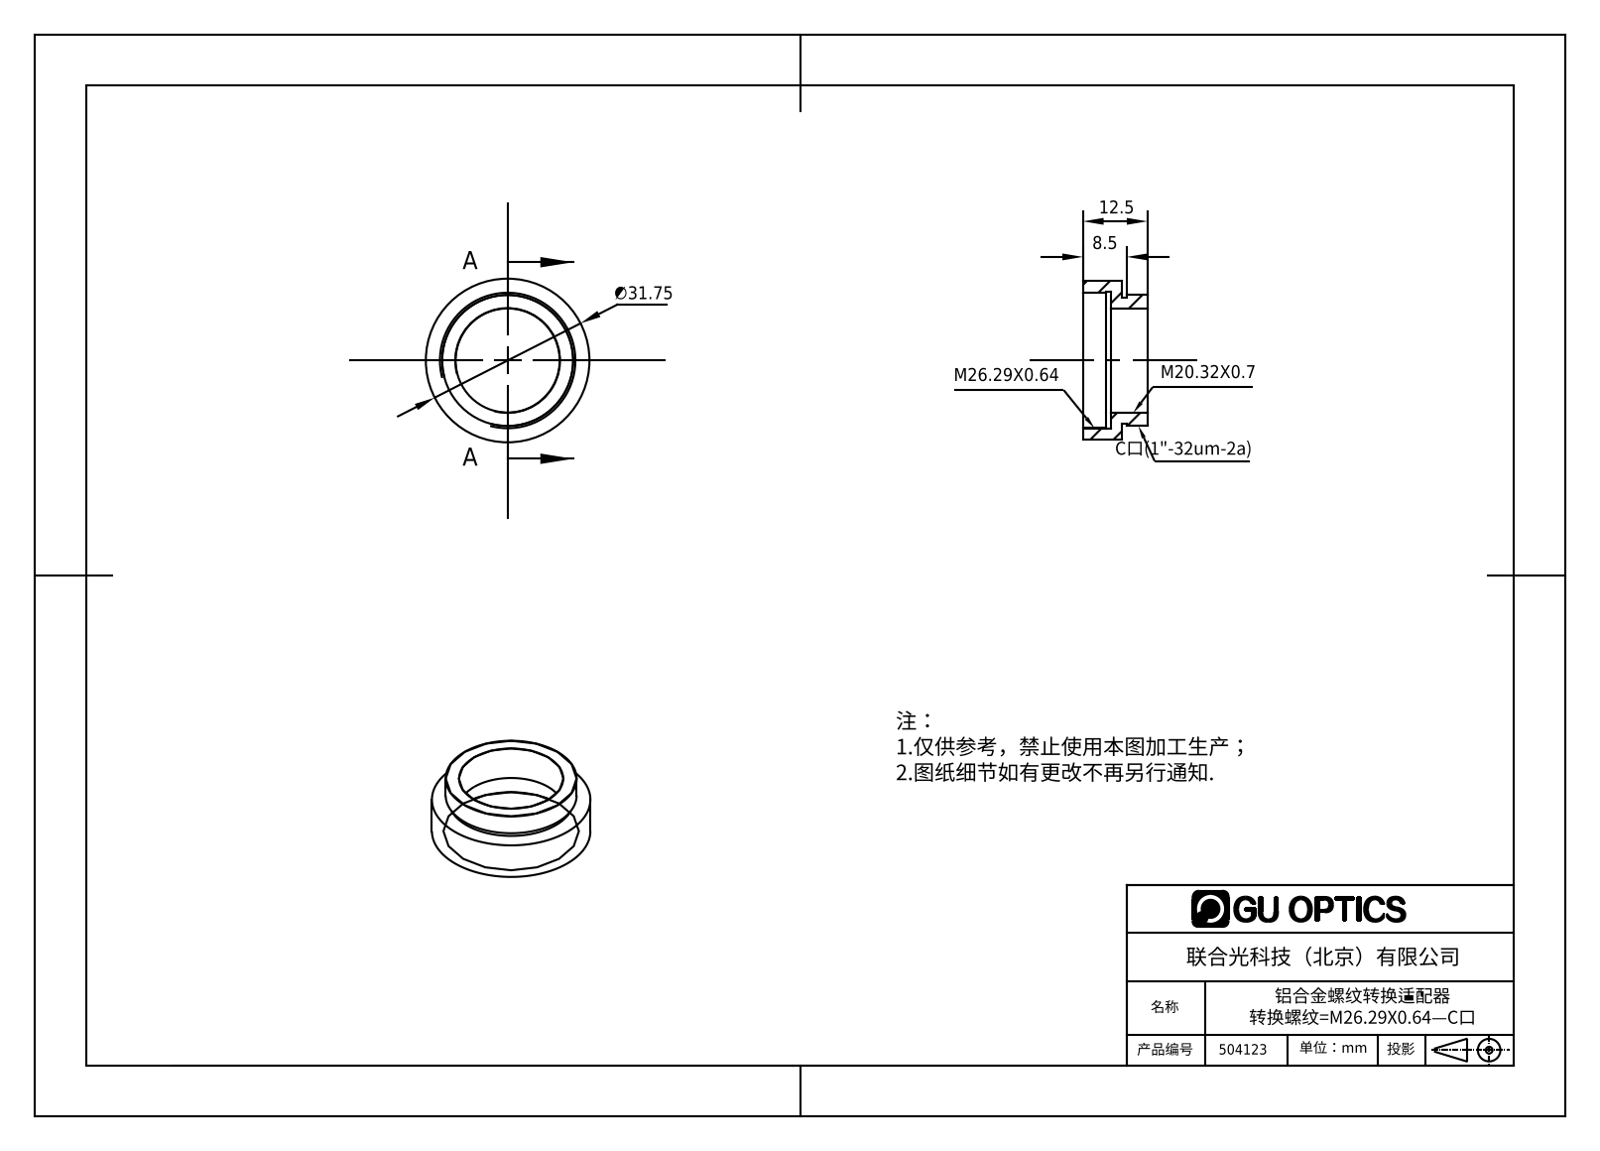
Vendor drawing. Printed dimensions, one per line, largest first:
∅31.75
12.5
8.5
